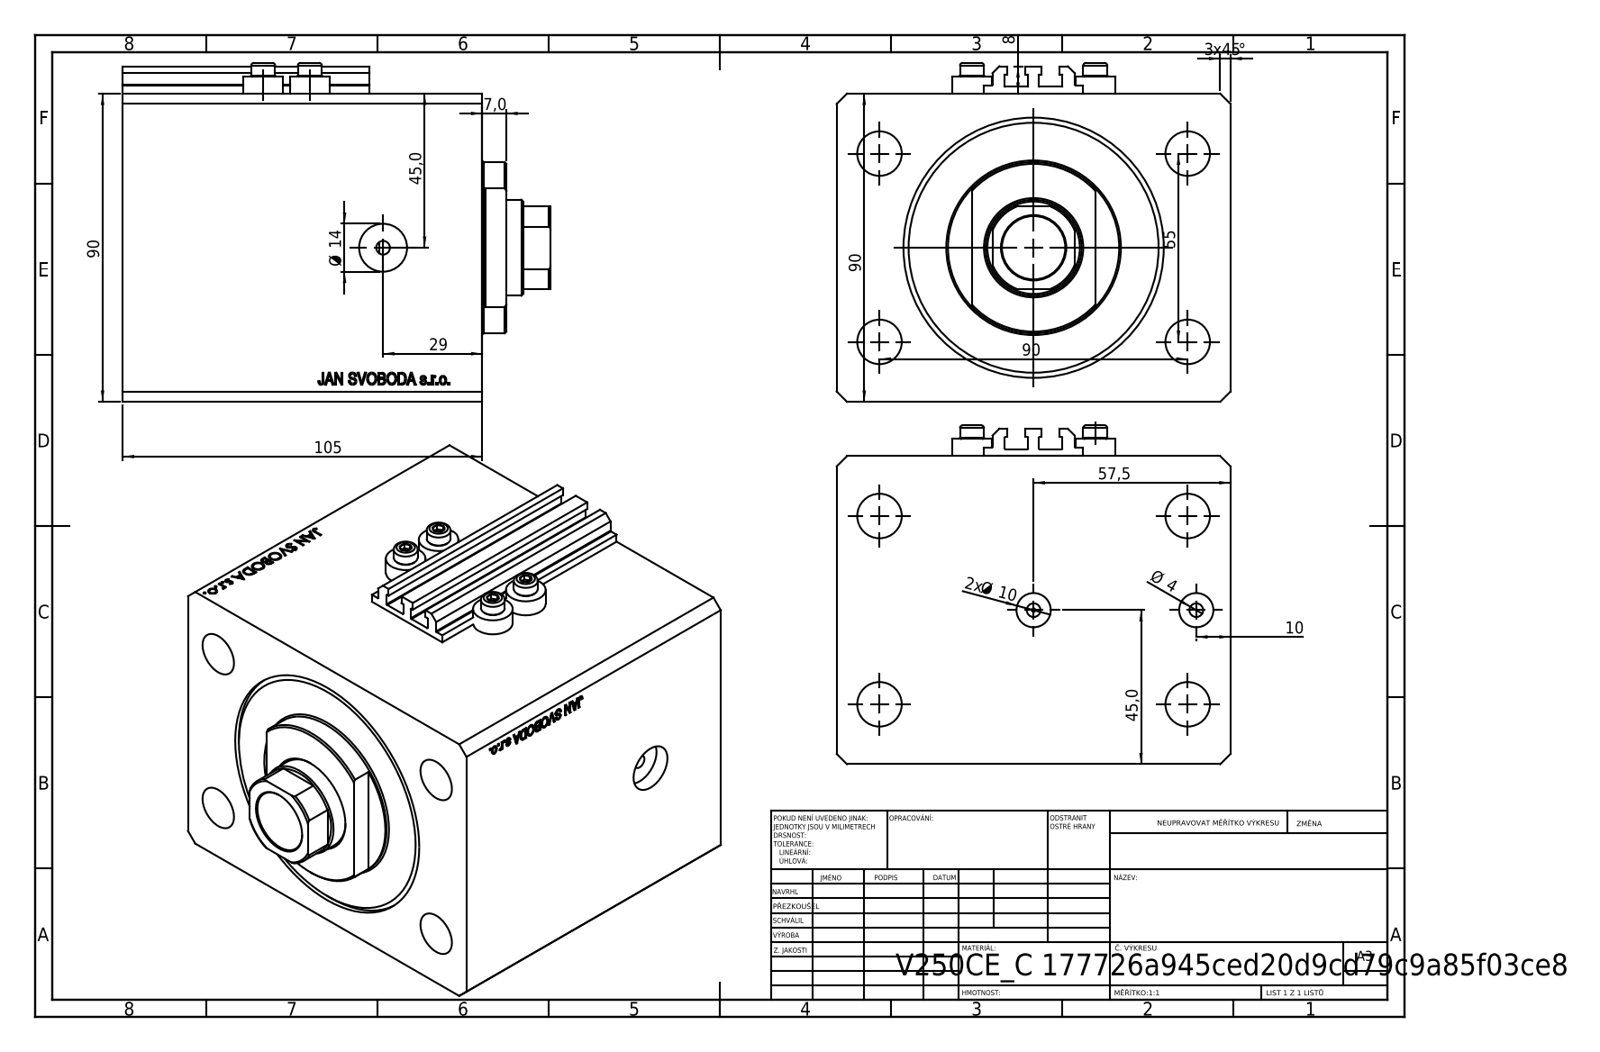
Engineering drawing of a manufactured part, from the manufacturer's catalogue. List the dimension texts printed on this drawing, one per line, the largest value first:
105
90
90
90
57,5
55
3 x45 °
45,0
45,0
29
Ø 14
2x Ø 10
10
8
7,0
Ø 4
